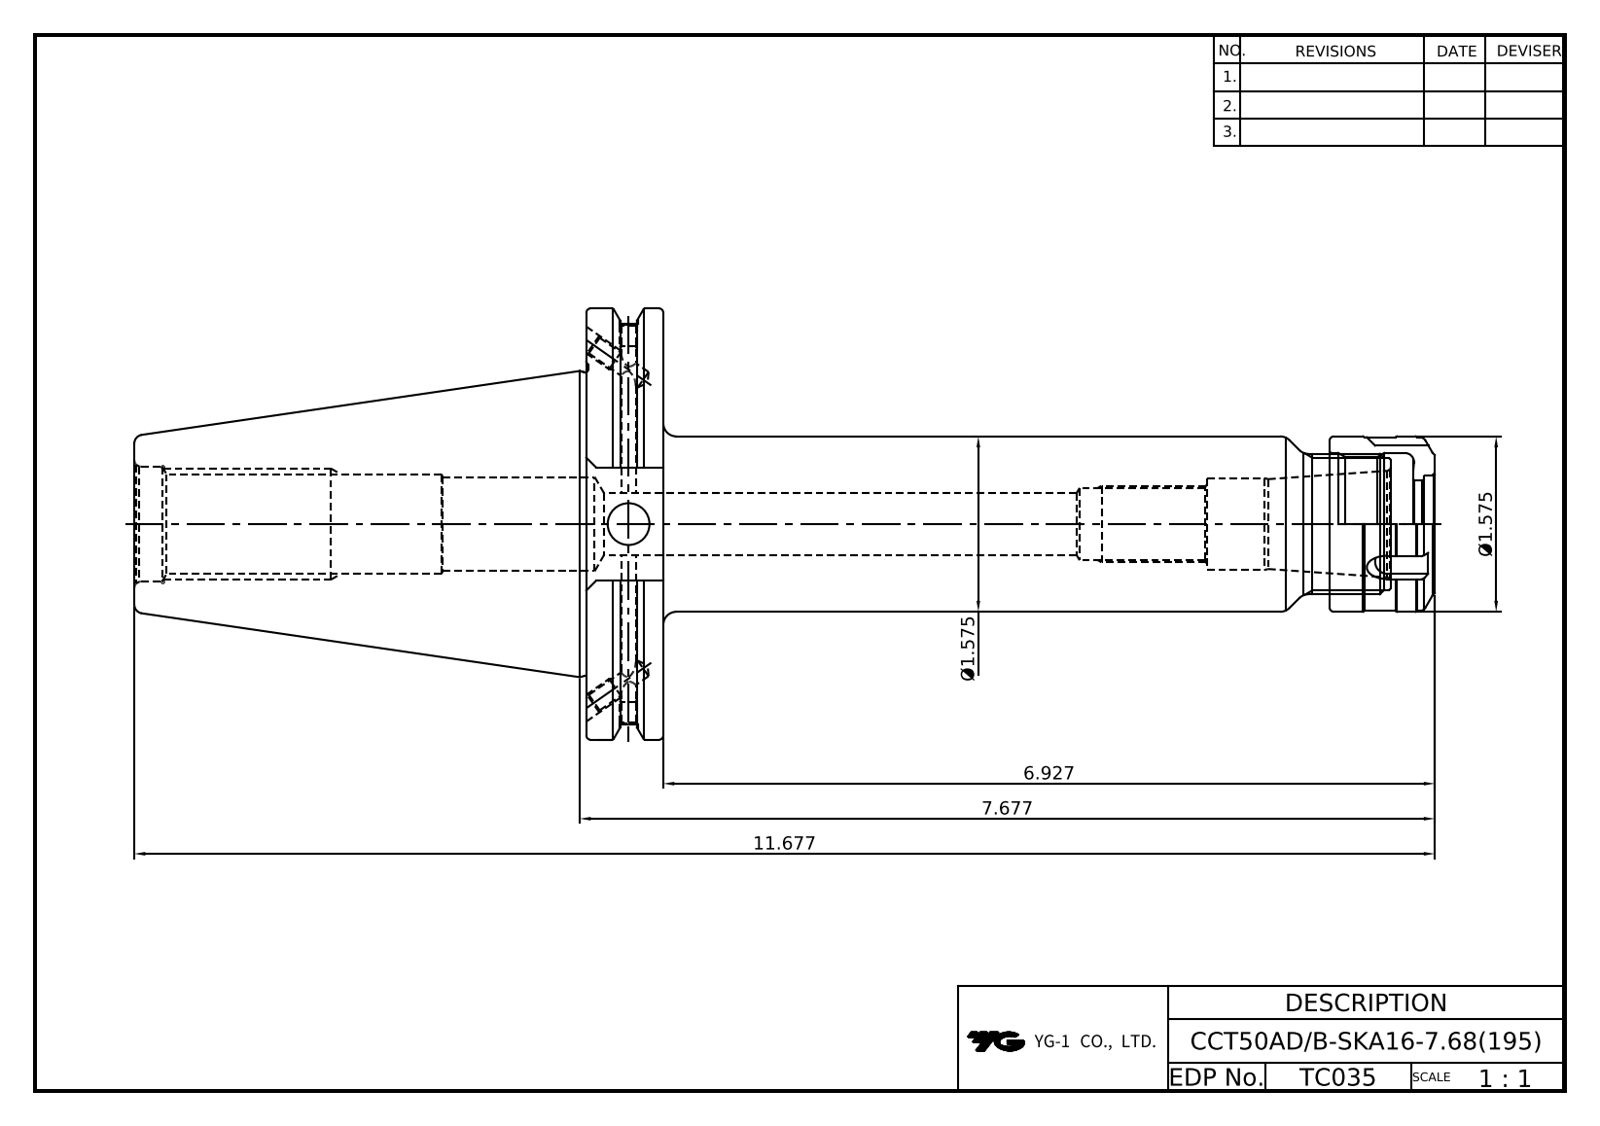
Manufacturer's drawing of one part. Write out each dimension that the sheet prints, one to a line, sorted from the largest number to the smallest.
11.677
7.677
6.927
Ø1.575
Ø1.575
